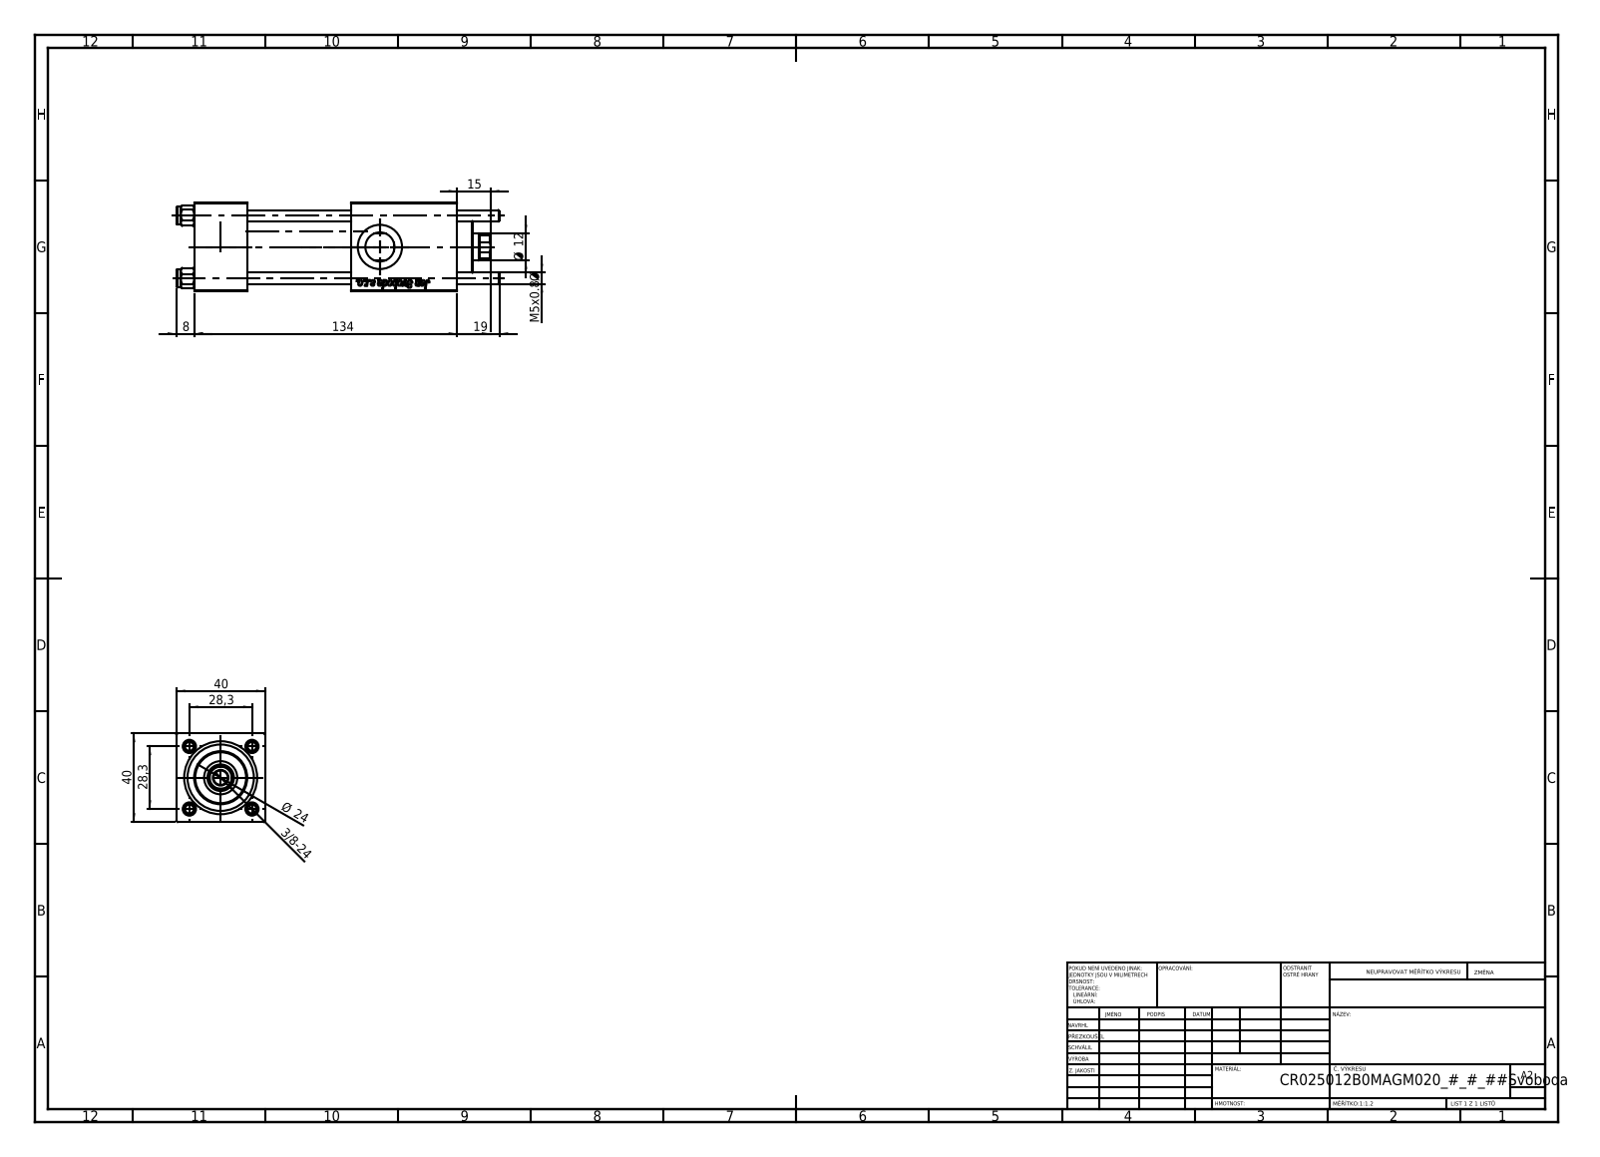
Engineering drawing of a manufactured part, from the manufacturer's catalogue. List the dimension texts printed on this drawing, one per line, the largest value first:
134
40
40
28,3
28,3
Ø 24
19
15
Ø 12
8
M5x0.8 Ø
3/8-24
